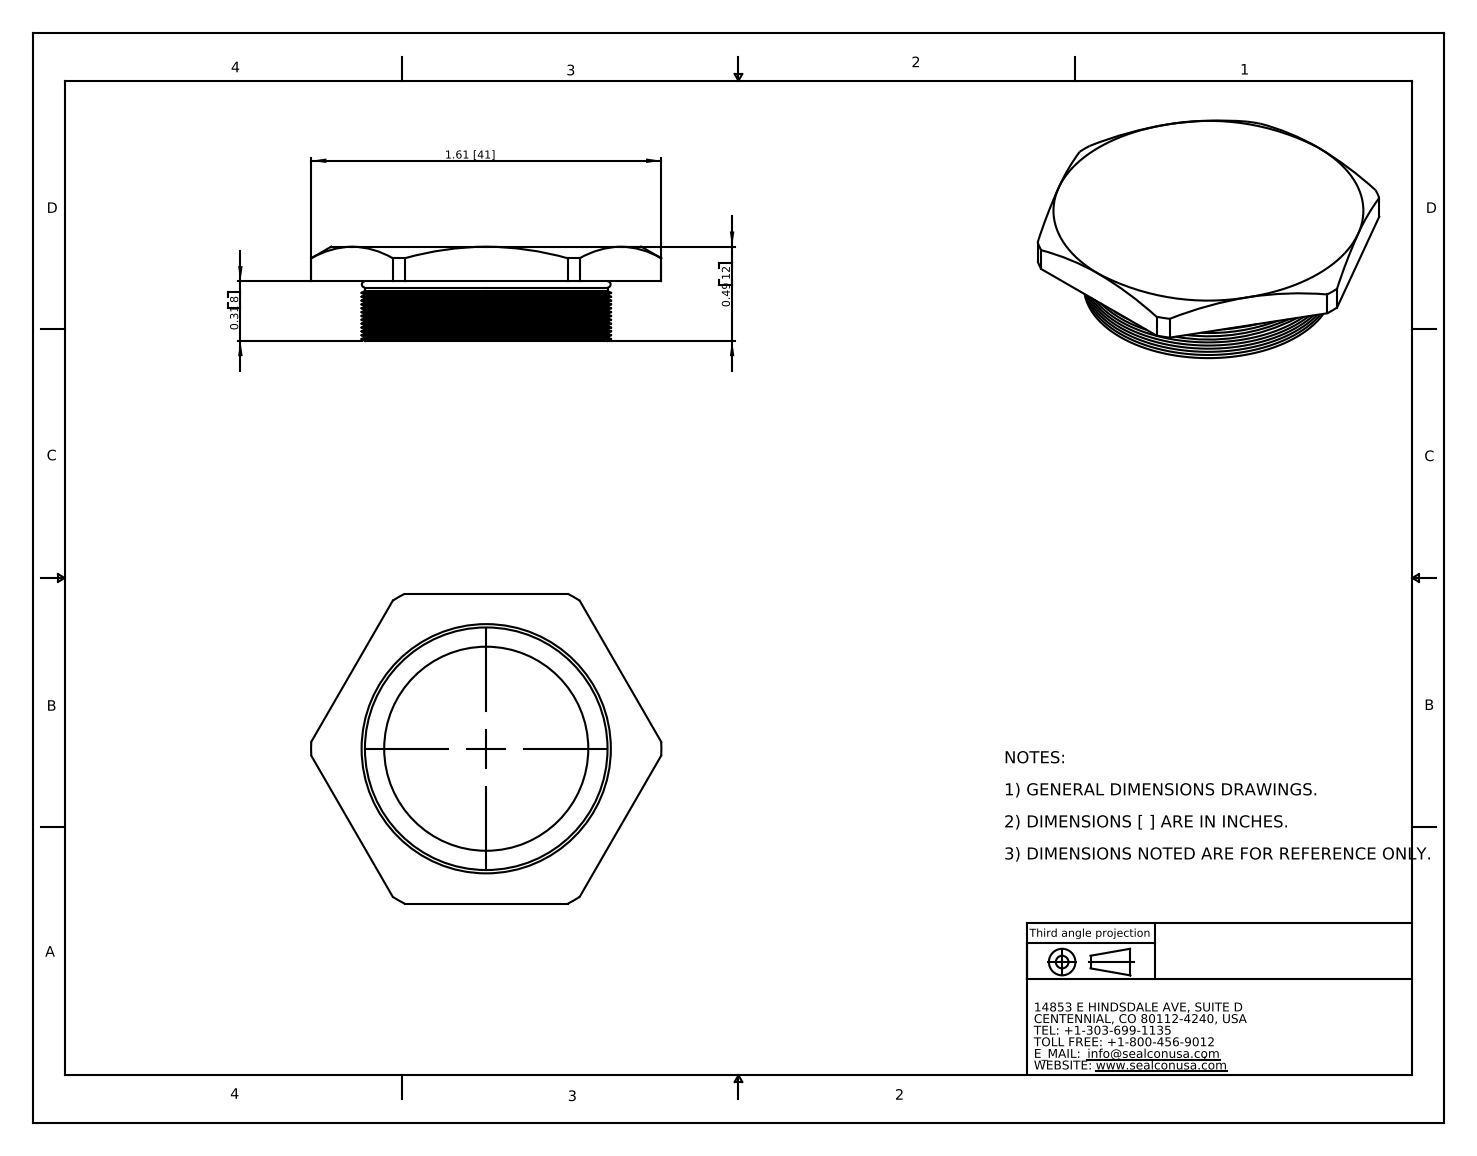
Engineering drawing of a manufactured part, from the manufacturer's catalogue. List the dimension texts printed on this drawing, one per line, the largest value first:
1.61 [41]
0.49 12
0.31 8
